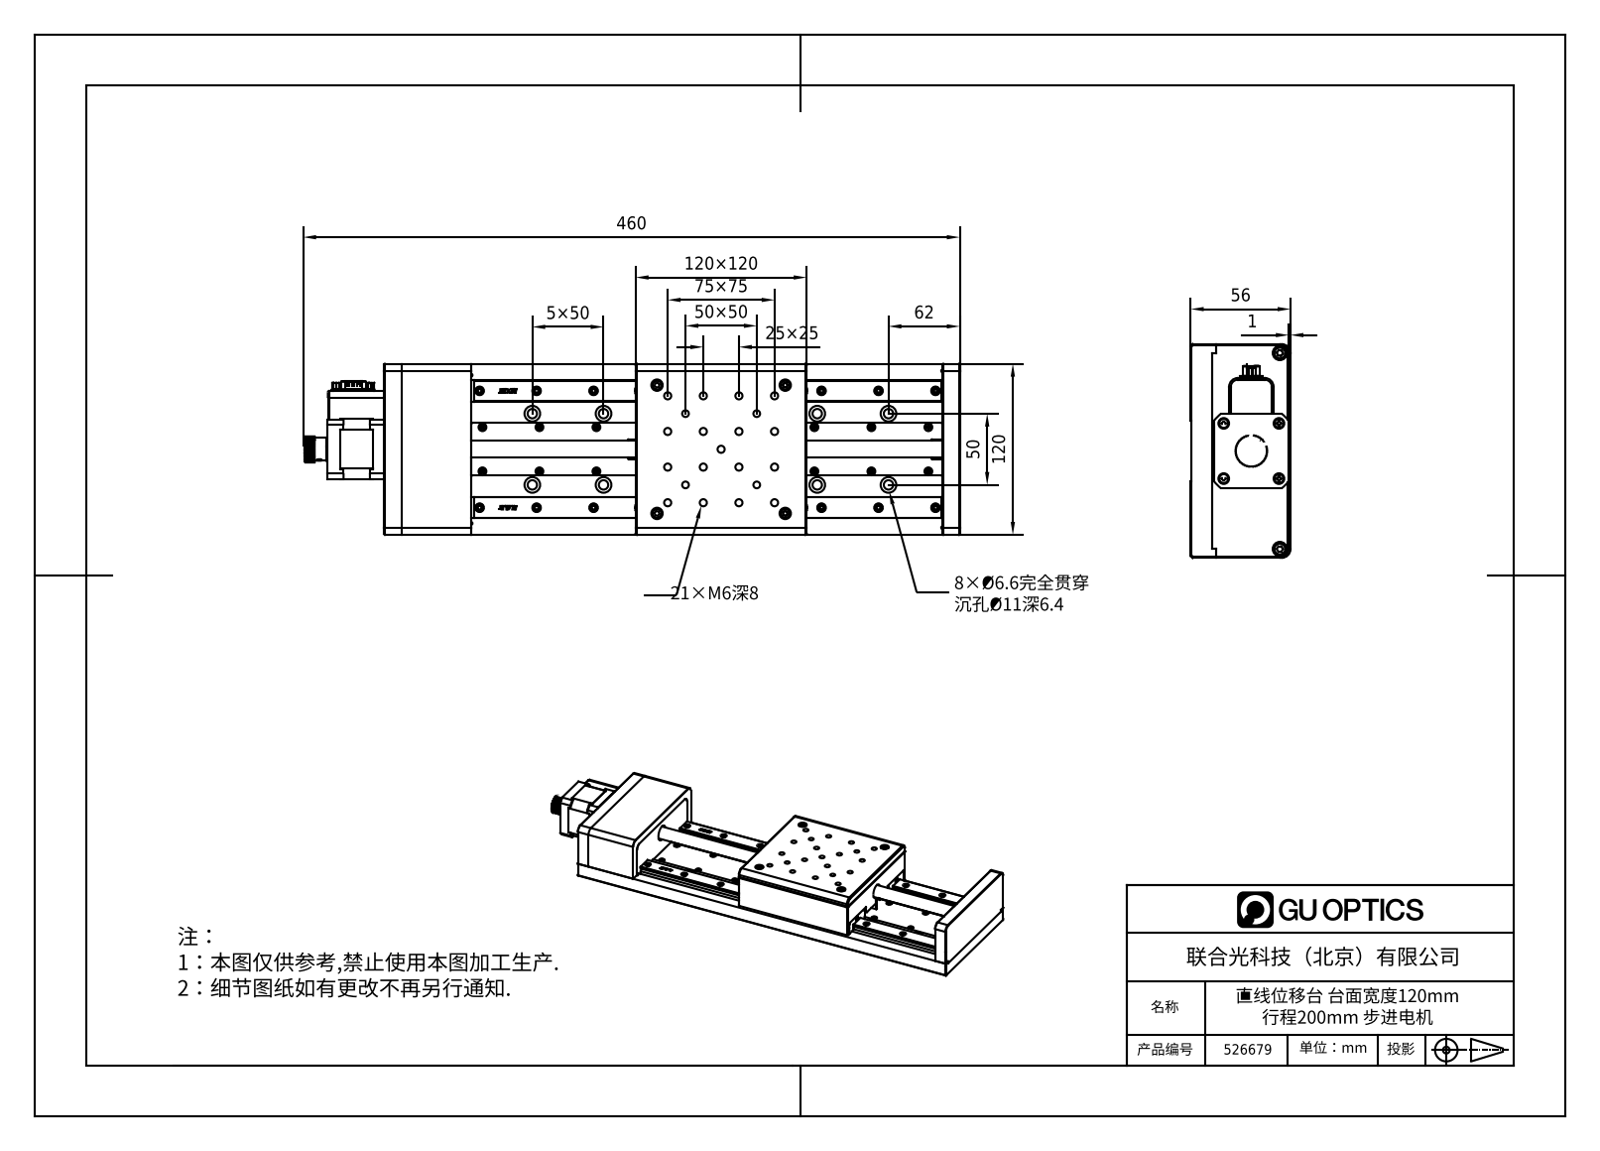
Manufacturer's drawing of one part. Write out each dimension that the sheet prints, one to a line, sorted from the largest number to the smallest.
460
120×120
120
75×75
62
56
50×50
50
5×50
25×25
1
